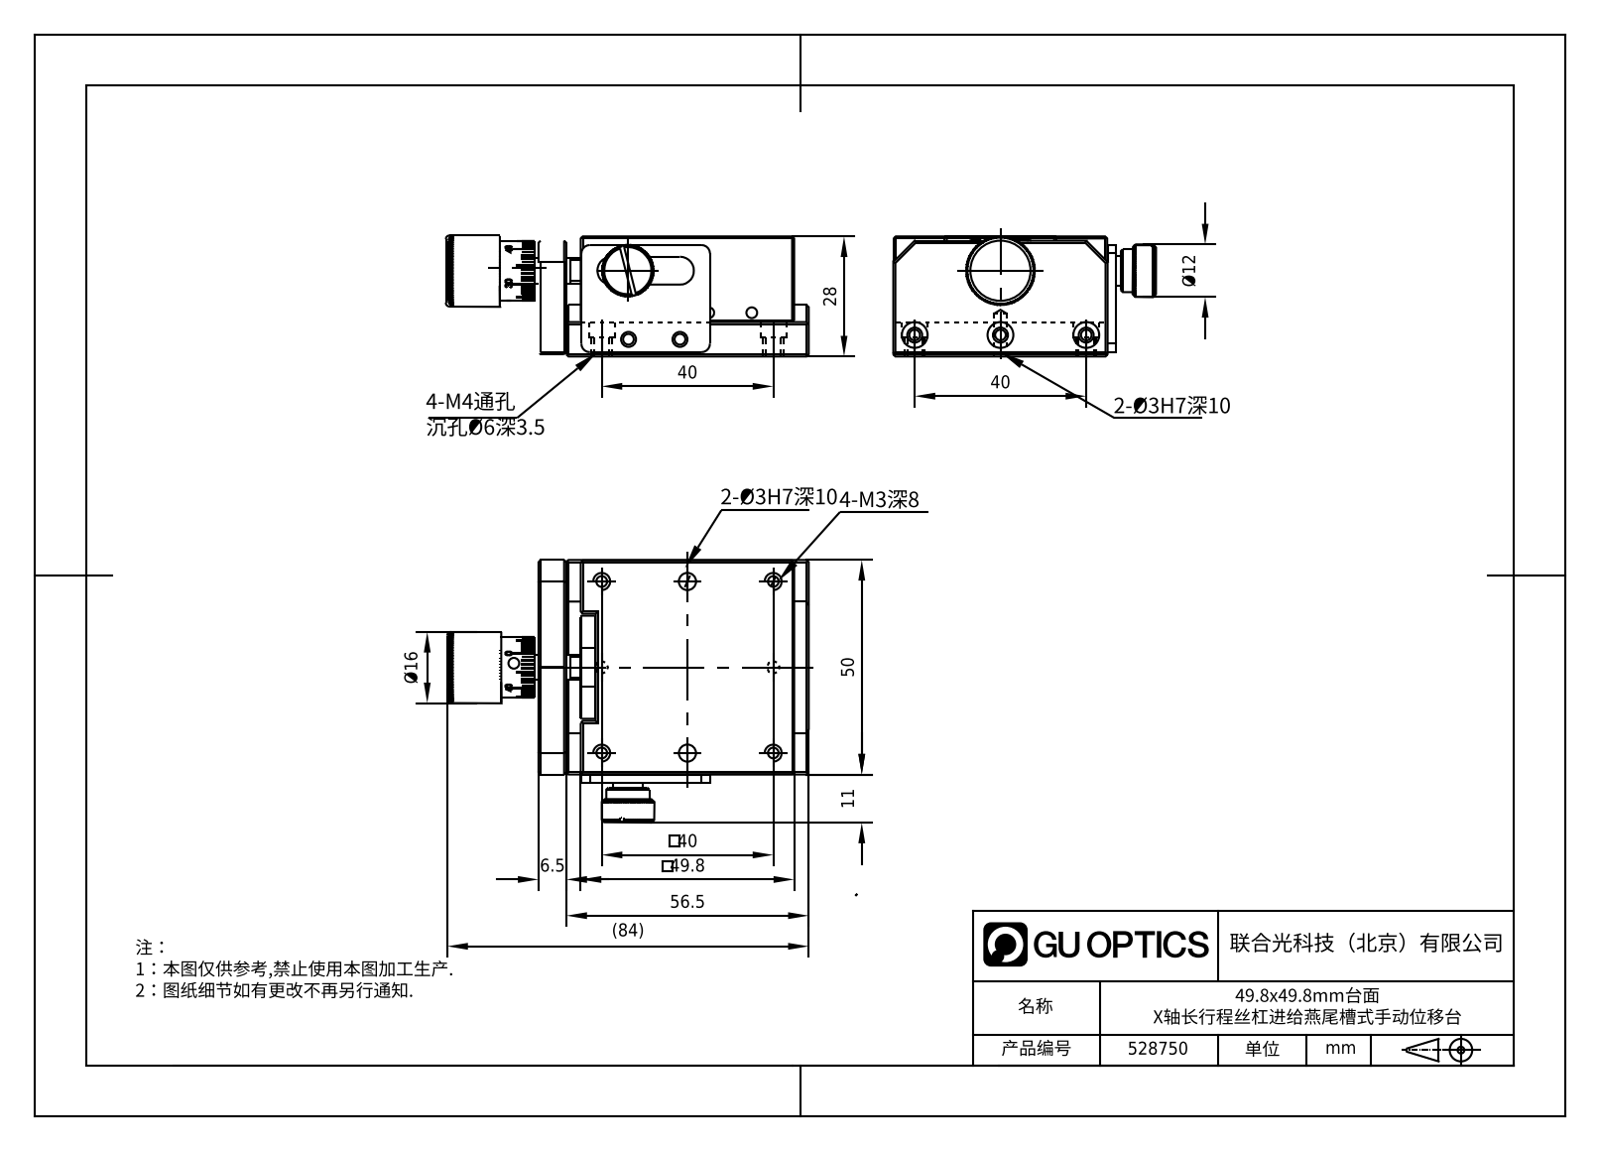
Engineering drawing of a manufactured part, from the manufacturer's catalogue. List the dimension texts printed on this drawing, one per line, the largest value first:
(84)
56.5
50
49.8
40
40
40
28
Ø16
Ø12
11
6.5
